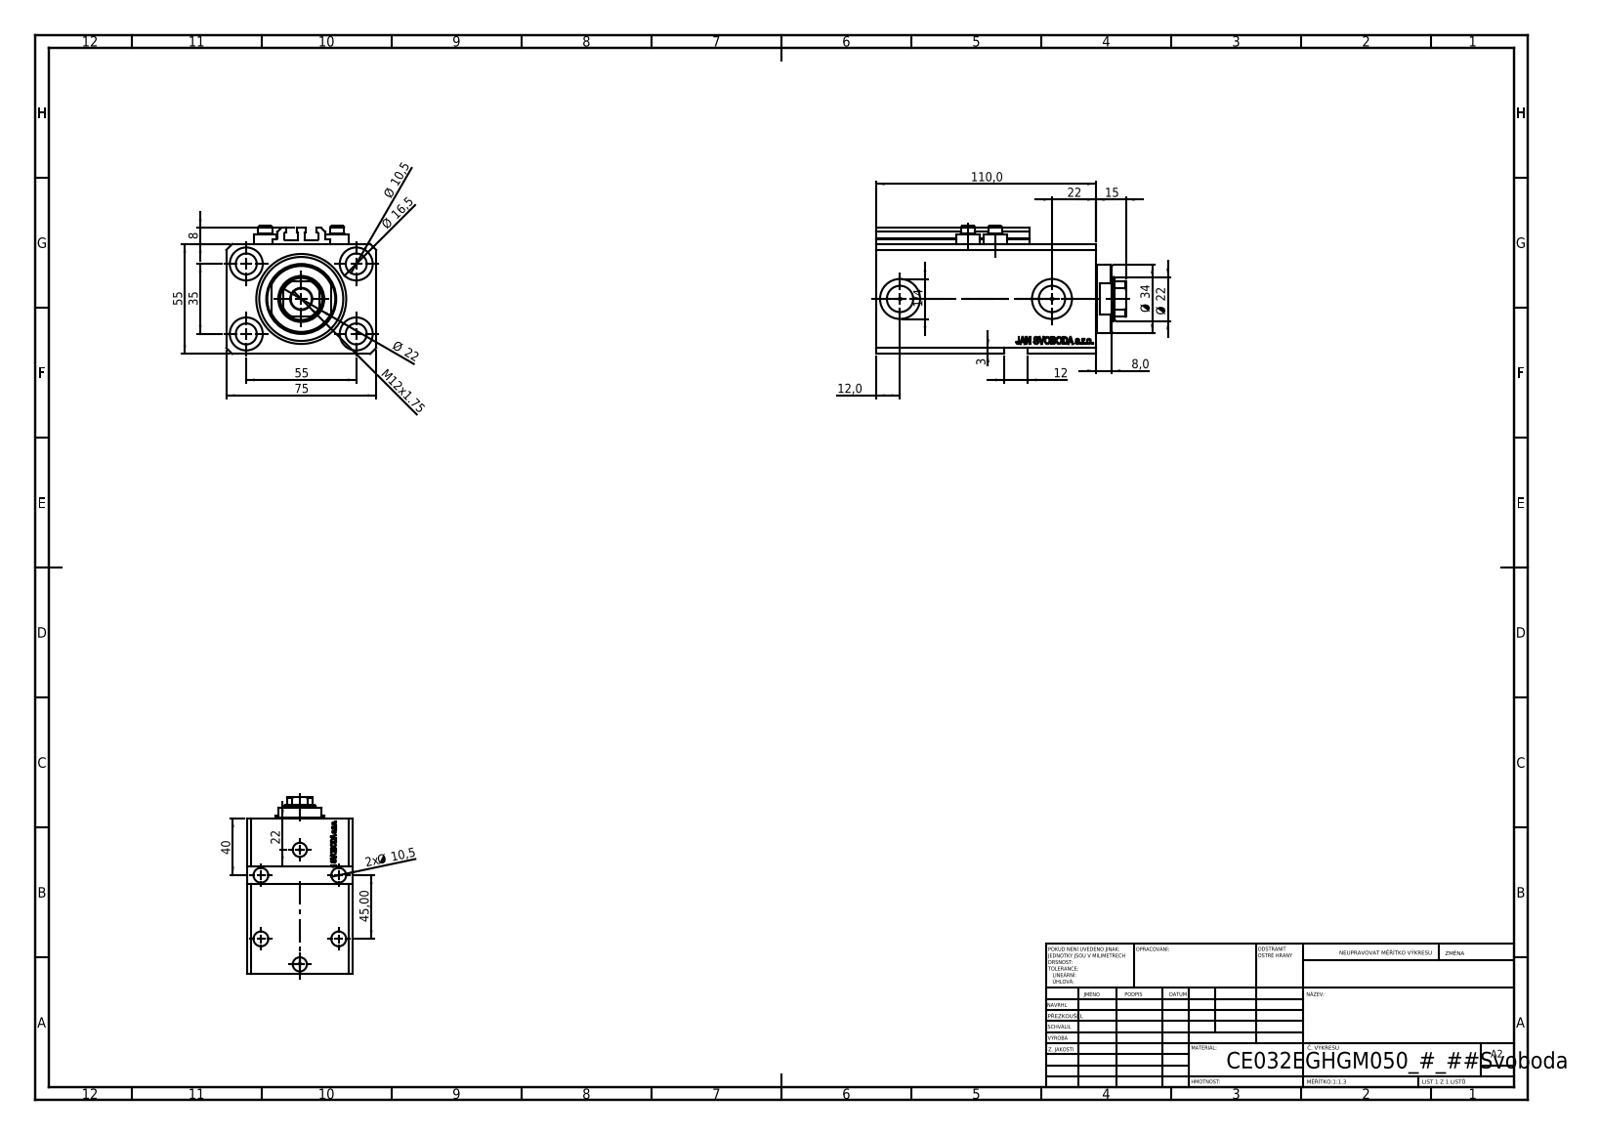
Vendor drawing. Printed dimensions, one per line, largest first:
110,0
75
55
55
45,00
40
35
Ø 34
Ø 22
22
Ø 22
22
Ø 16,5
15
M12x1.75
12,0
12
Ø 10,5
2x Ø 10,5
8
8,0
3
1/4
